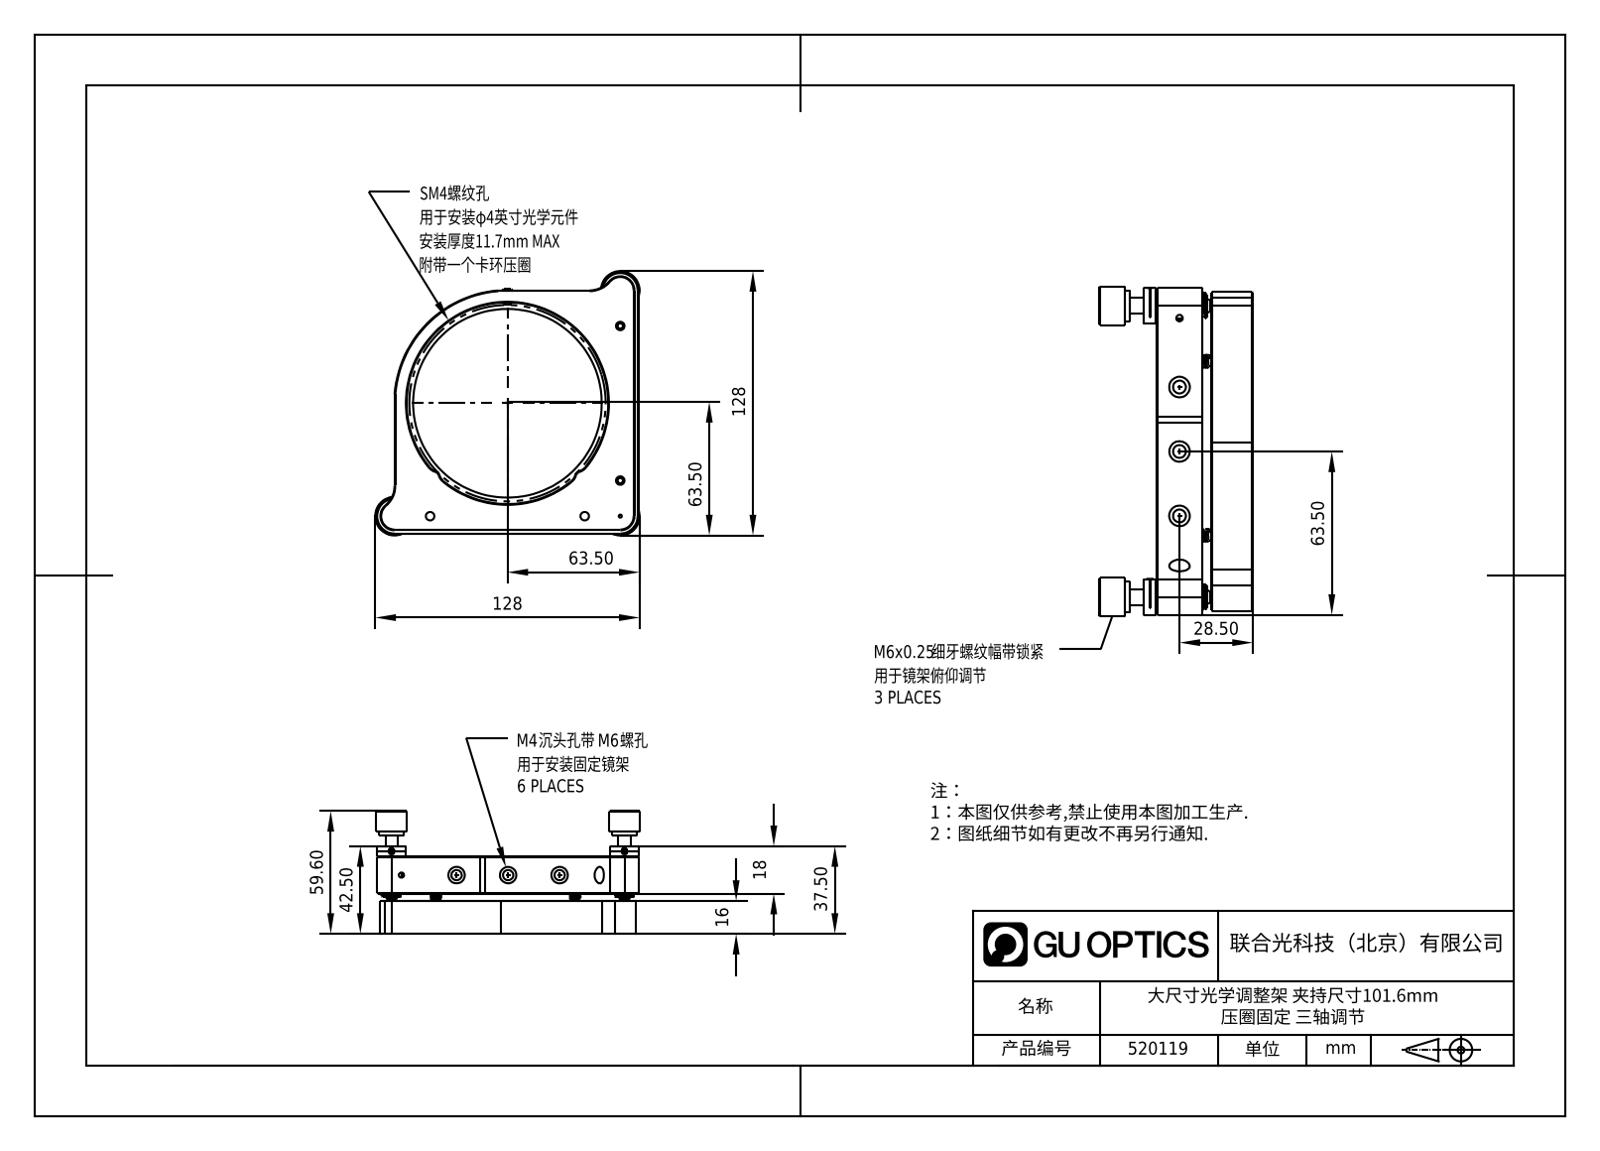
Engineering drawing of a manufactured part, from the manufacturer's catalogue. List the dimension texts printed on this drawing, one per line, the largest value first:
128
128
63.50
63.50
63.50
59.60
42.50
37.50
28.50
18
16
